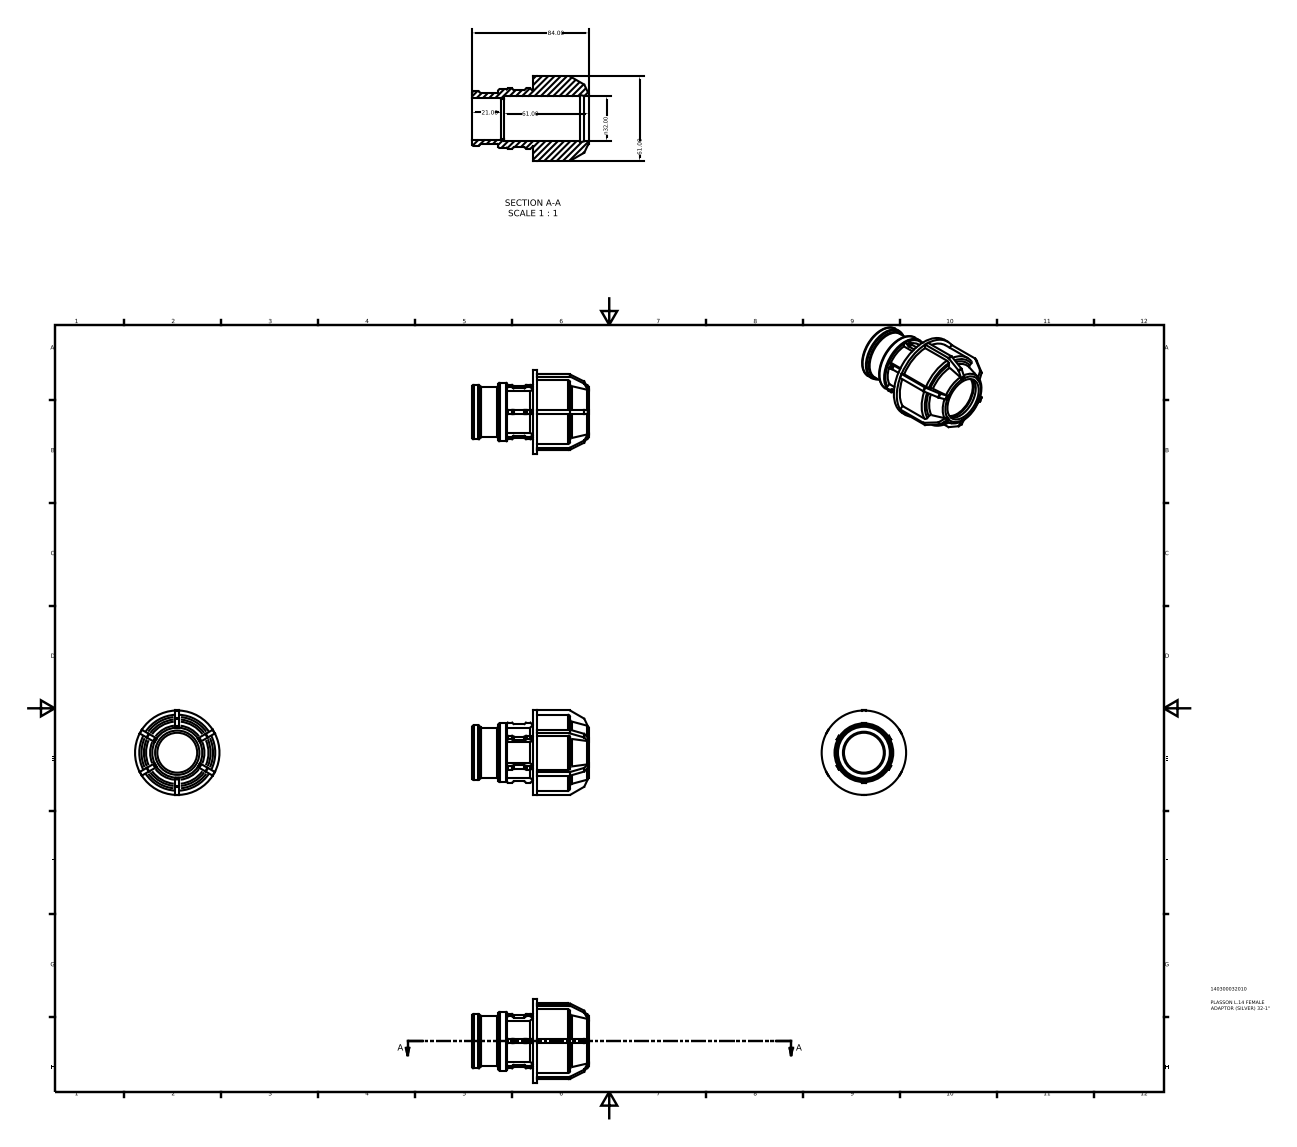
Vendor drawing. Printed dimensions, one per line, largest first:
84.00
61.00
61.00
n32.00
21.00
